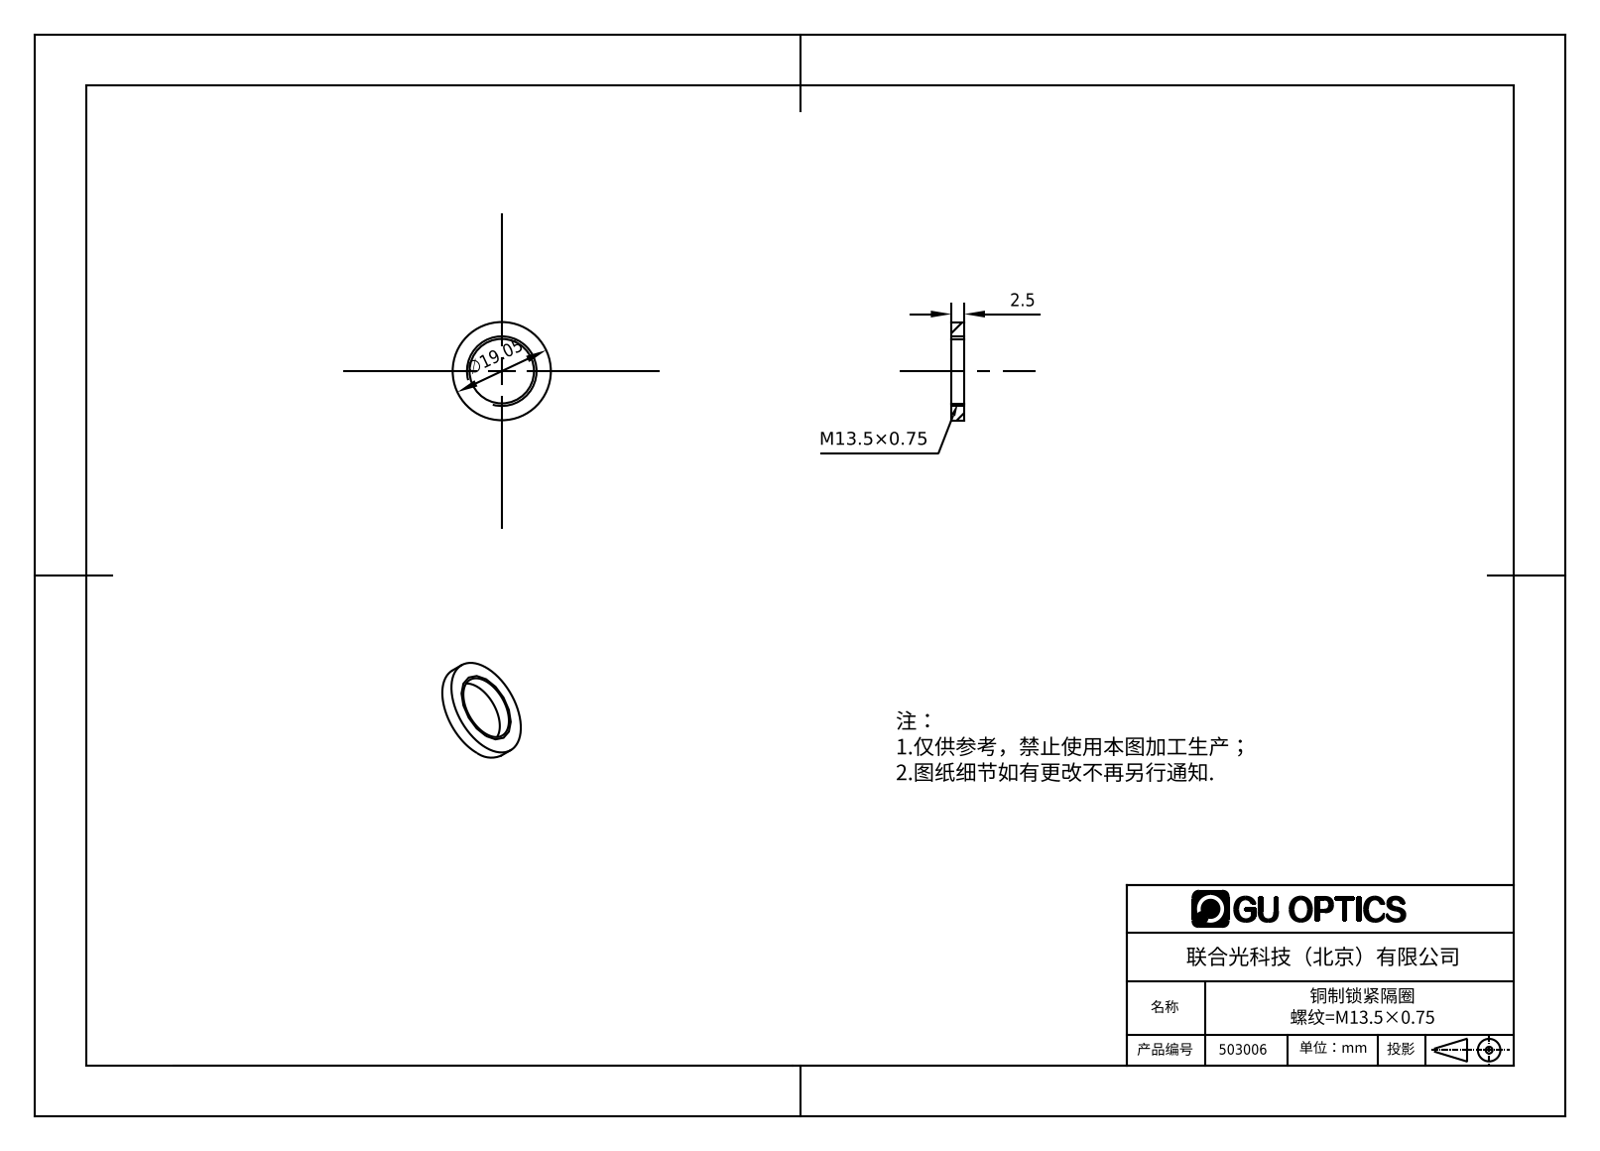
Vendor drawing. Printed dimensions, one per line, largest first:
∅19.05
2.5
